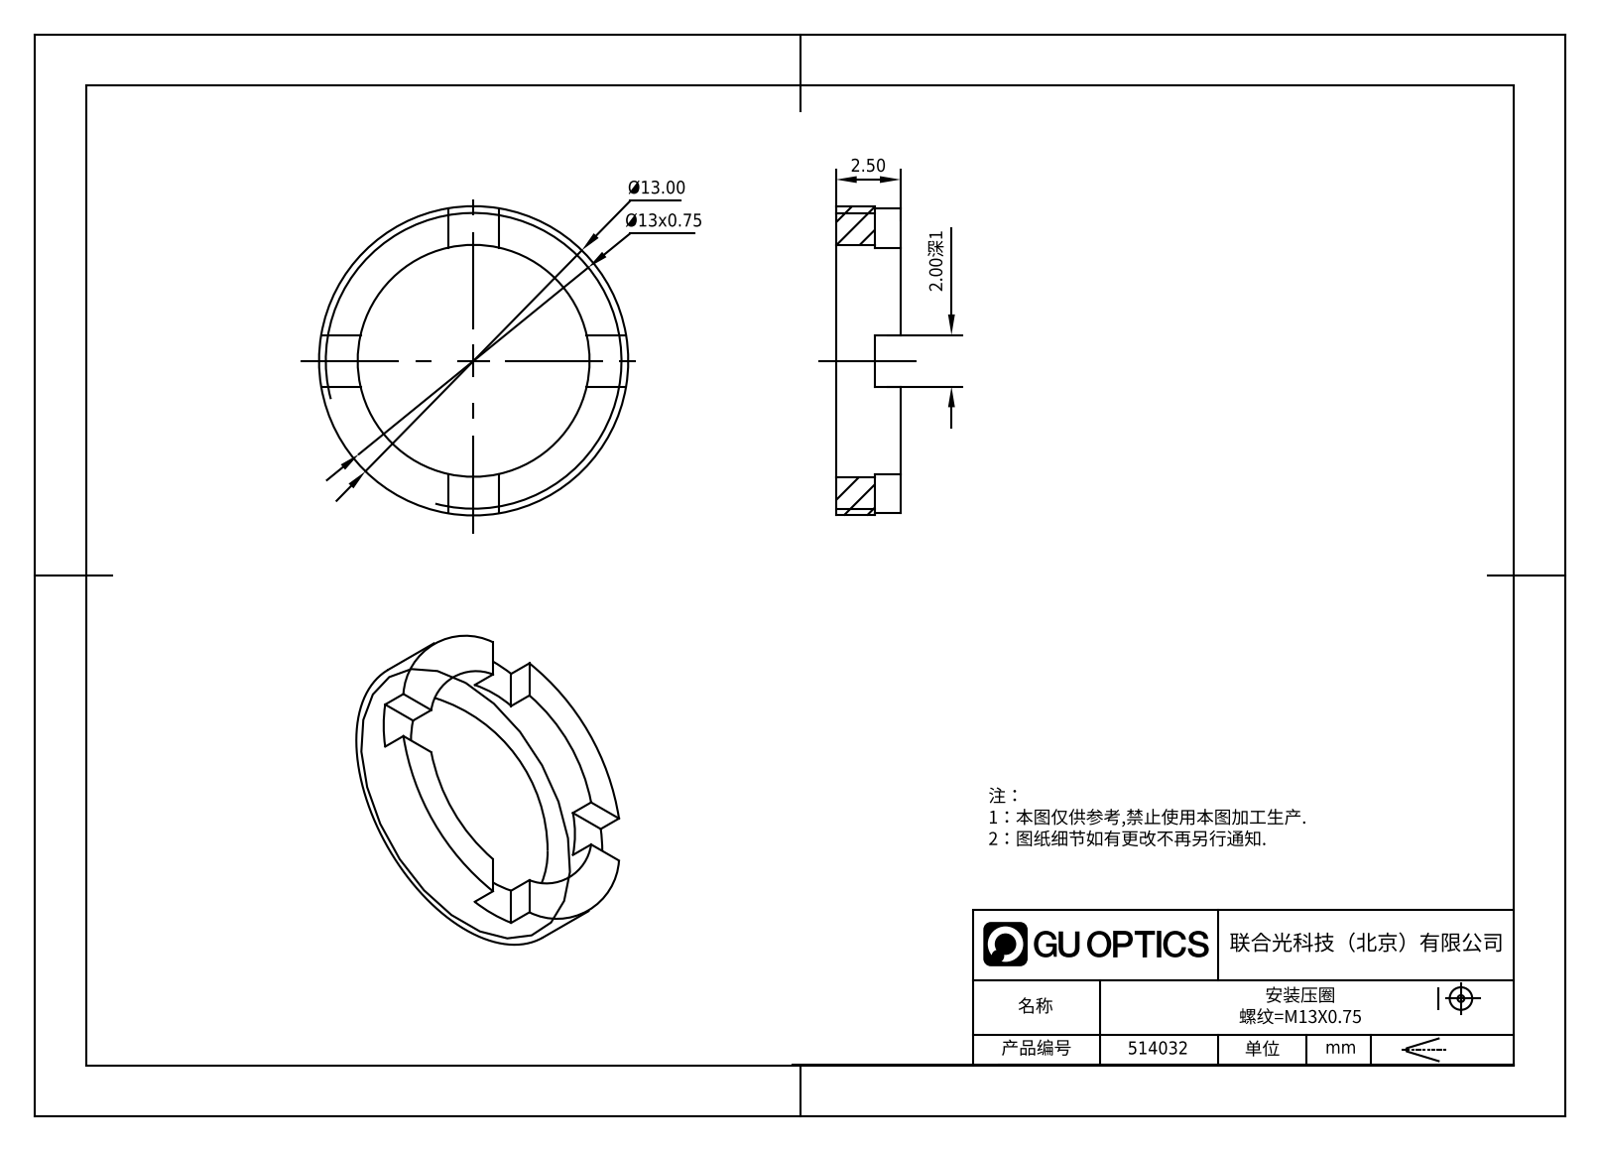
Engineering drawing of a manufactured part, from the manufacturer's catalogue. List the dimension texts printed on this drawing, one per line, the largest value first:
Ø13.00
Ø13x0.75
2.50
2.00深1
